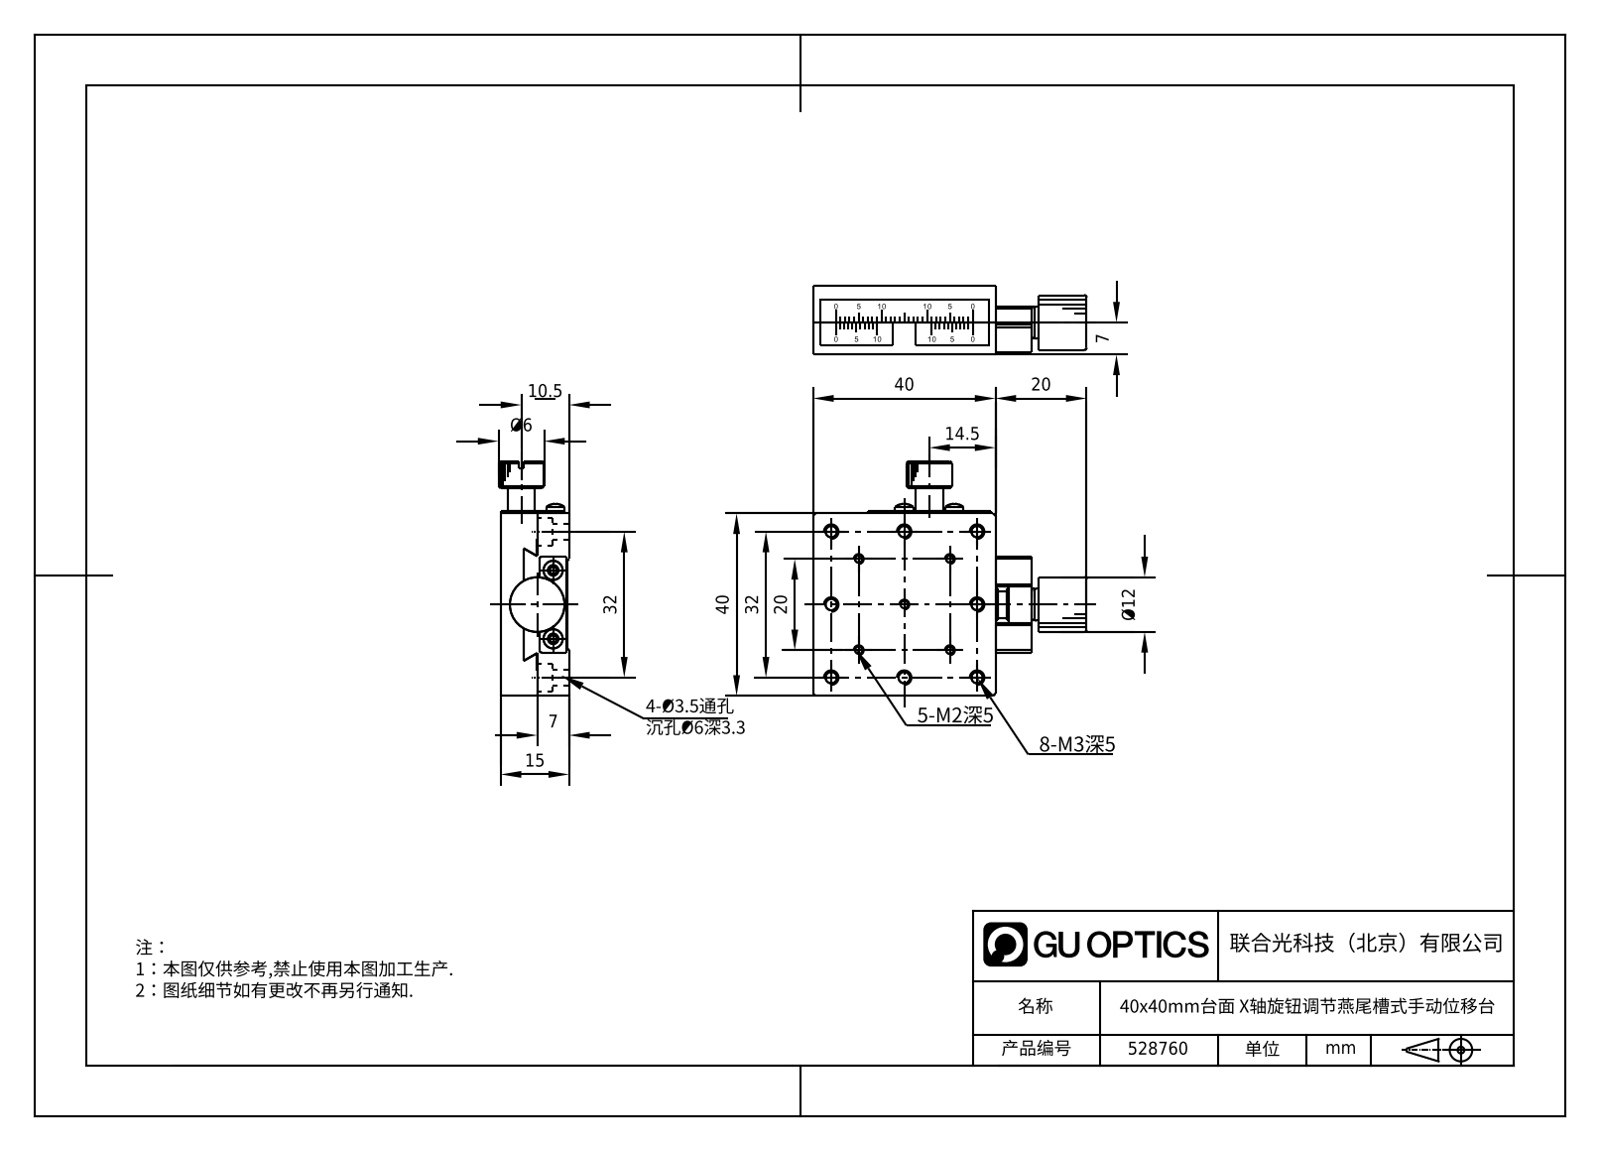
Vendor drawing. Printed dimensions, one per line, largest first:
40
40
32
32
20
20
15
14.5
Ø12
10.5
7
7
Ø6
